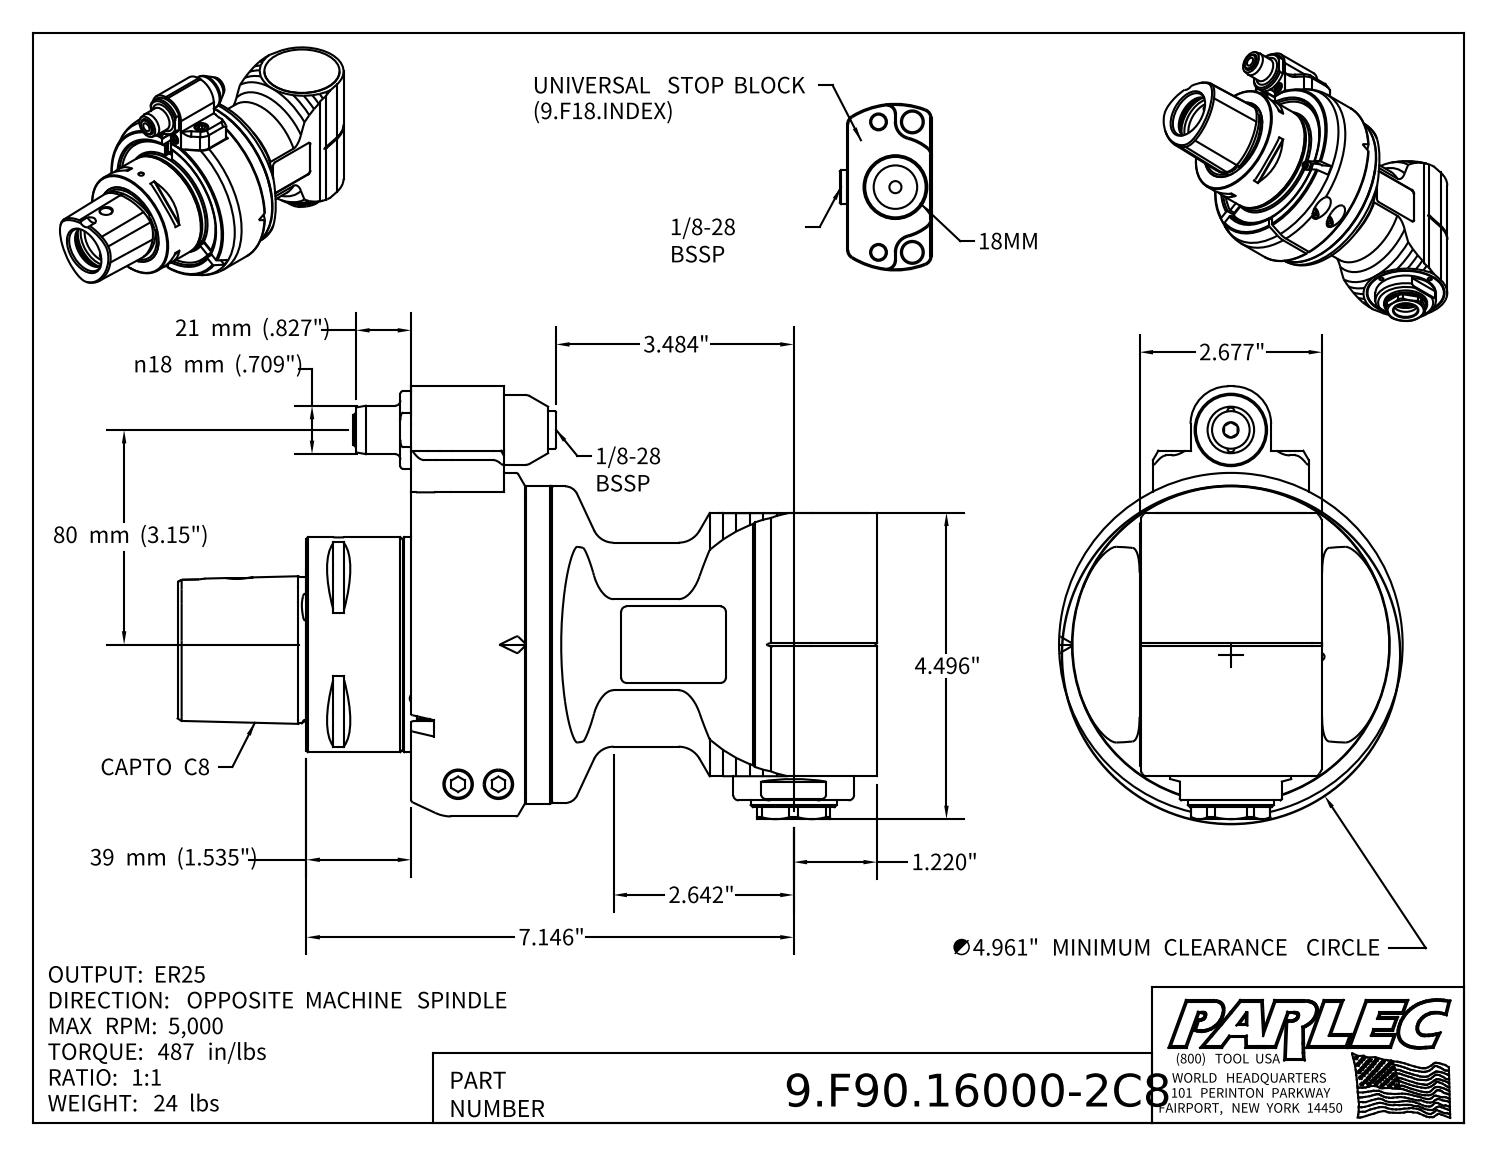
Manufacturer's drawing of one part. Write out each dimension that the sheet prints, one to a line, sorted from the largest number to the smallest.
80 mm (3.15")
39 mm (1.535")
21 mm (.827")
n18 mm (.709")
7.146"
∅4.961" MINIMUM CLEARANCE CIRCLE
4.496"
3.484"
2.677"
2.642"
1.220"
